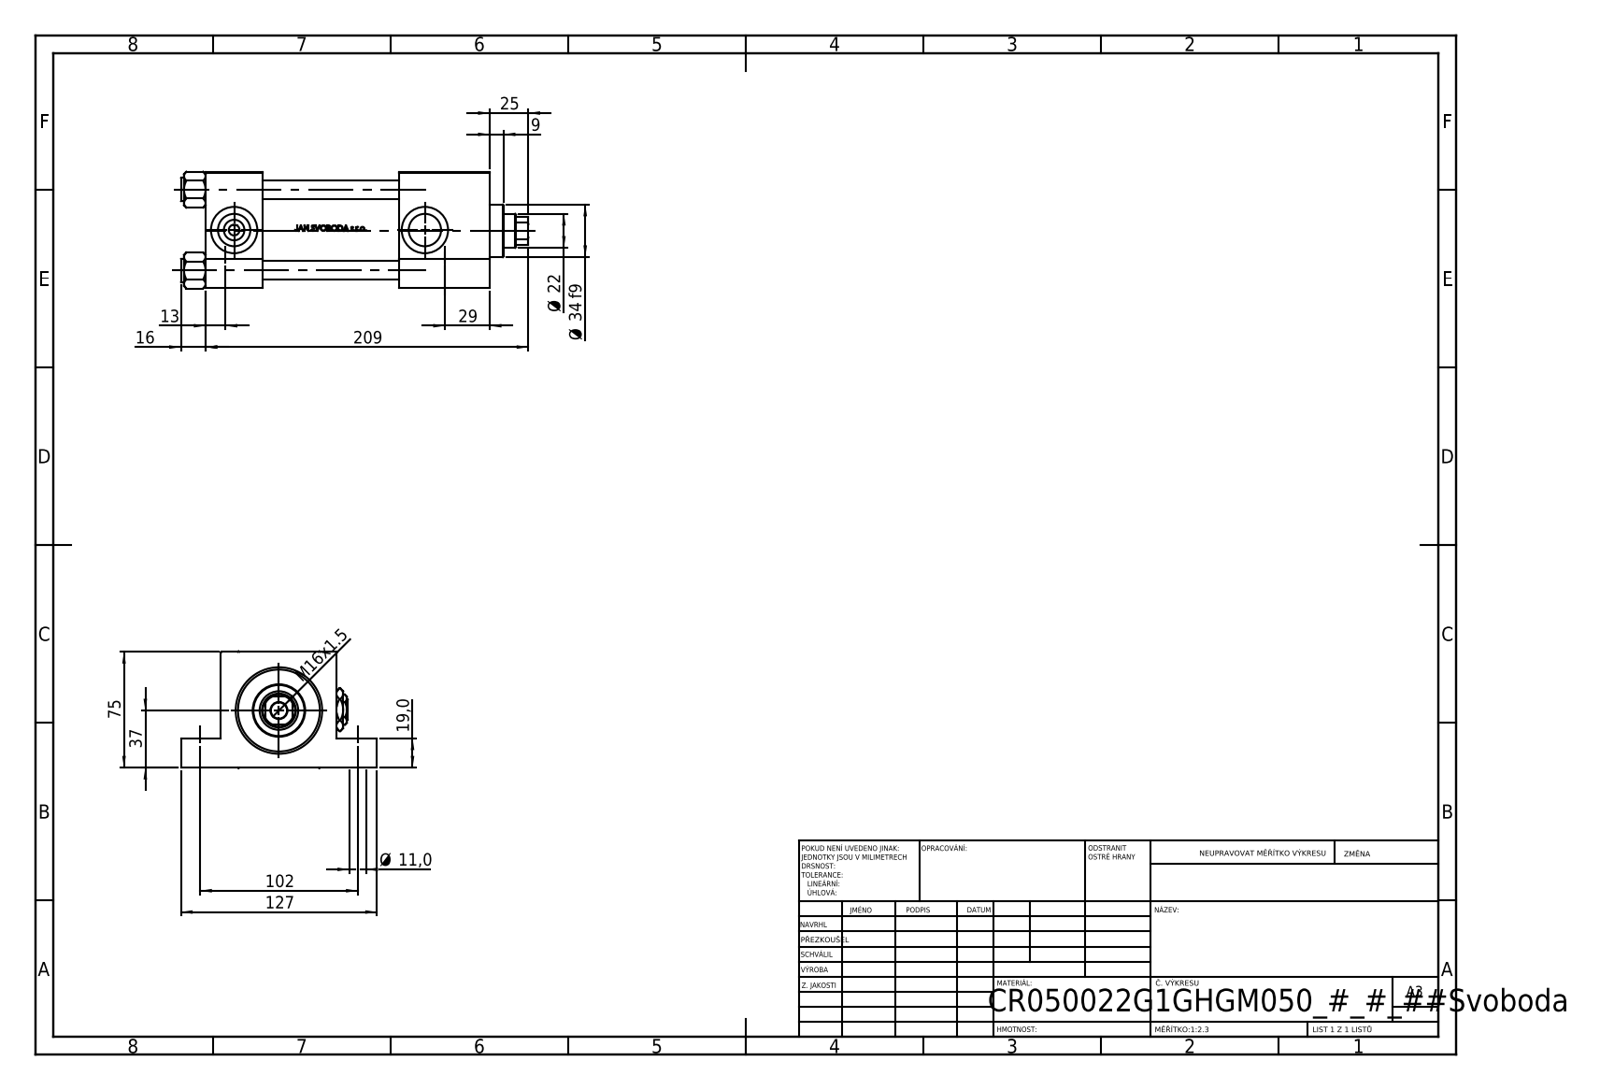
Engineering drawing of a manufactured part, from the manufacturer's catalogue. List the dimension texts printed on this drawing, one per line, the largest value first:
209
127
102
75
37
Ø 34 f9
29
25
Ø 22
19,0
16
M16x1.5
13
Ø 11,0
9
